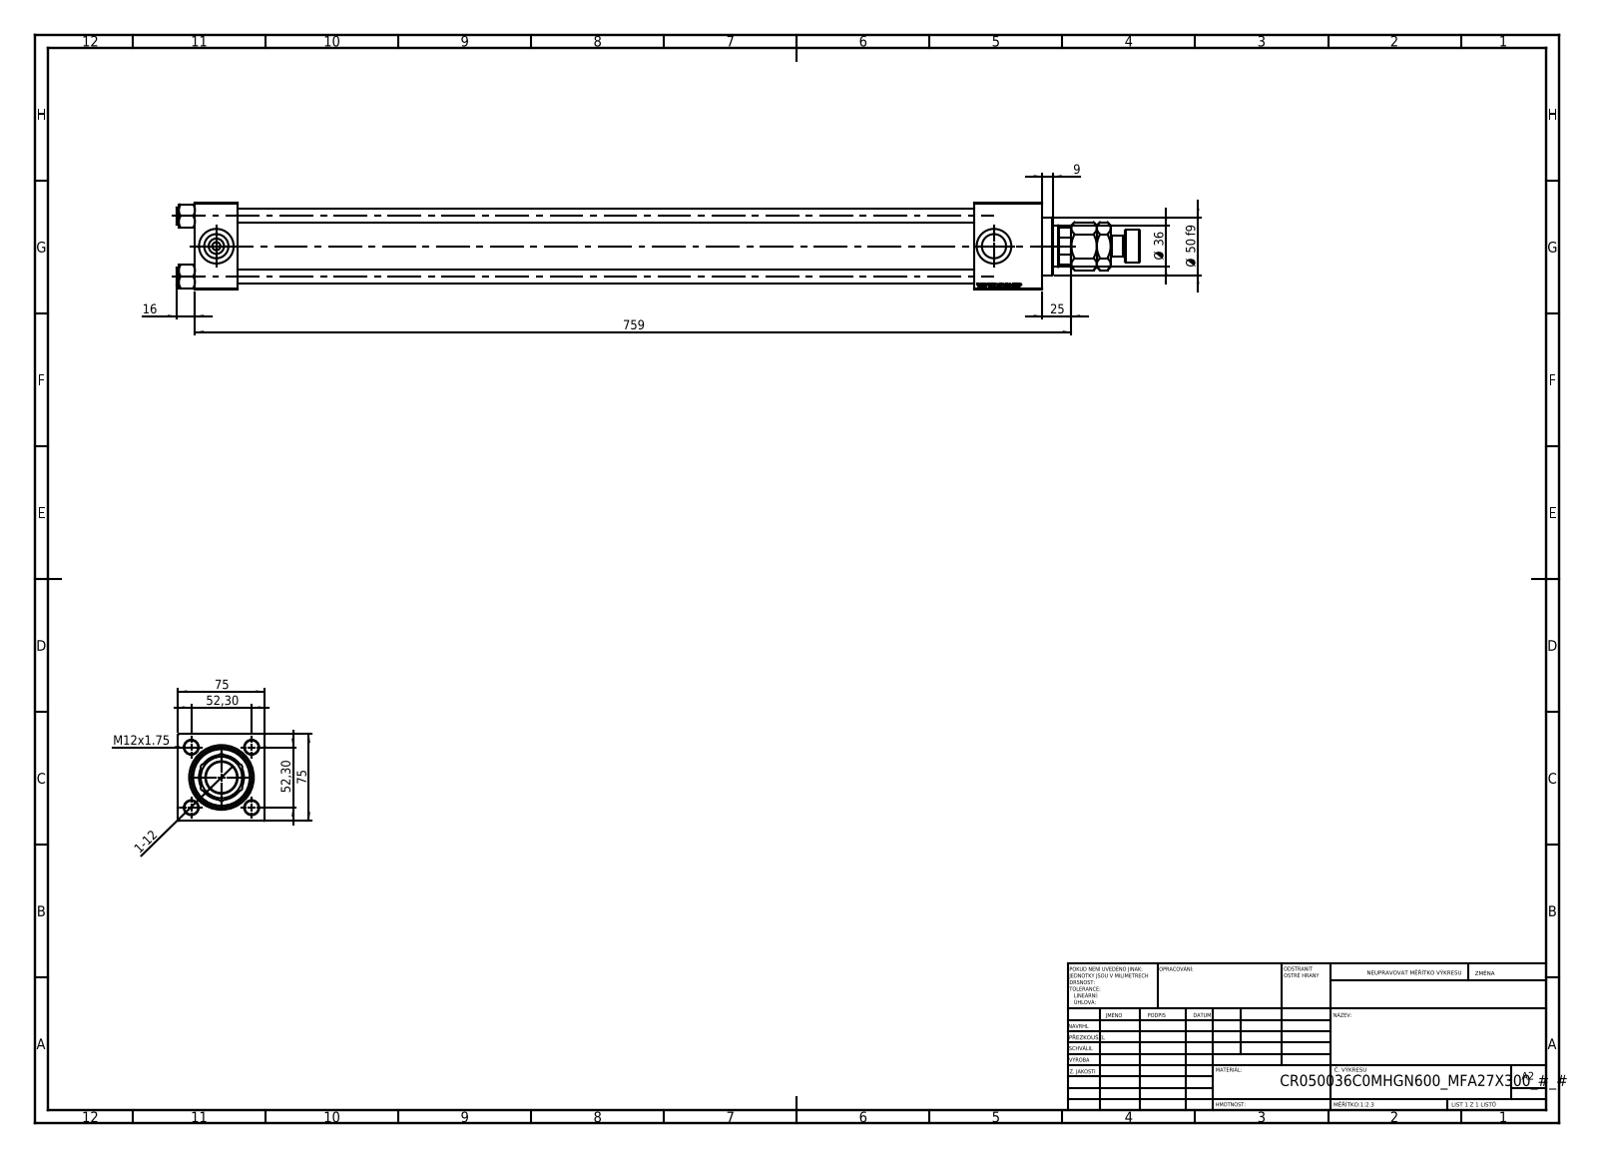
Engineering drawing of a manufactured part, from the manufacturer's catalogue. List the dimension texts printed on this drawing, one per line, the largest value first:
759
75
75
52,30
52,30
Ø 50 f9
Ø 36
25
16
M12x1.75
9
1-12
